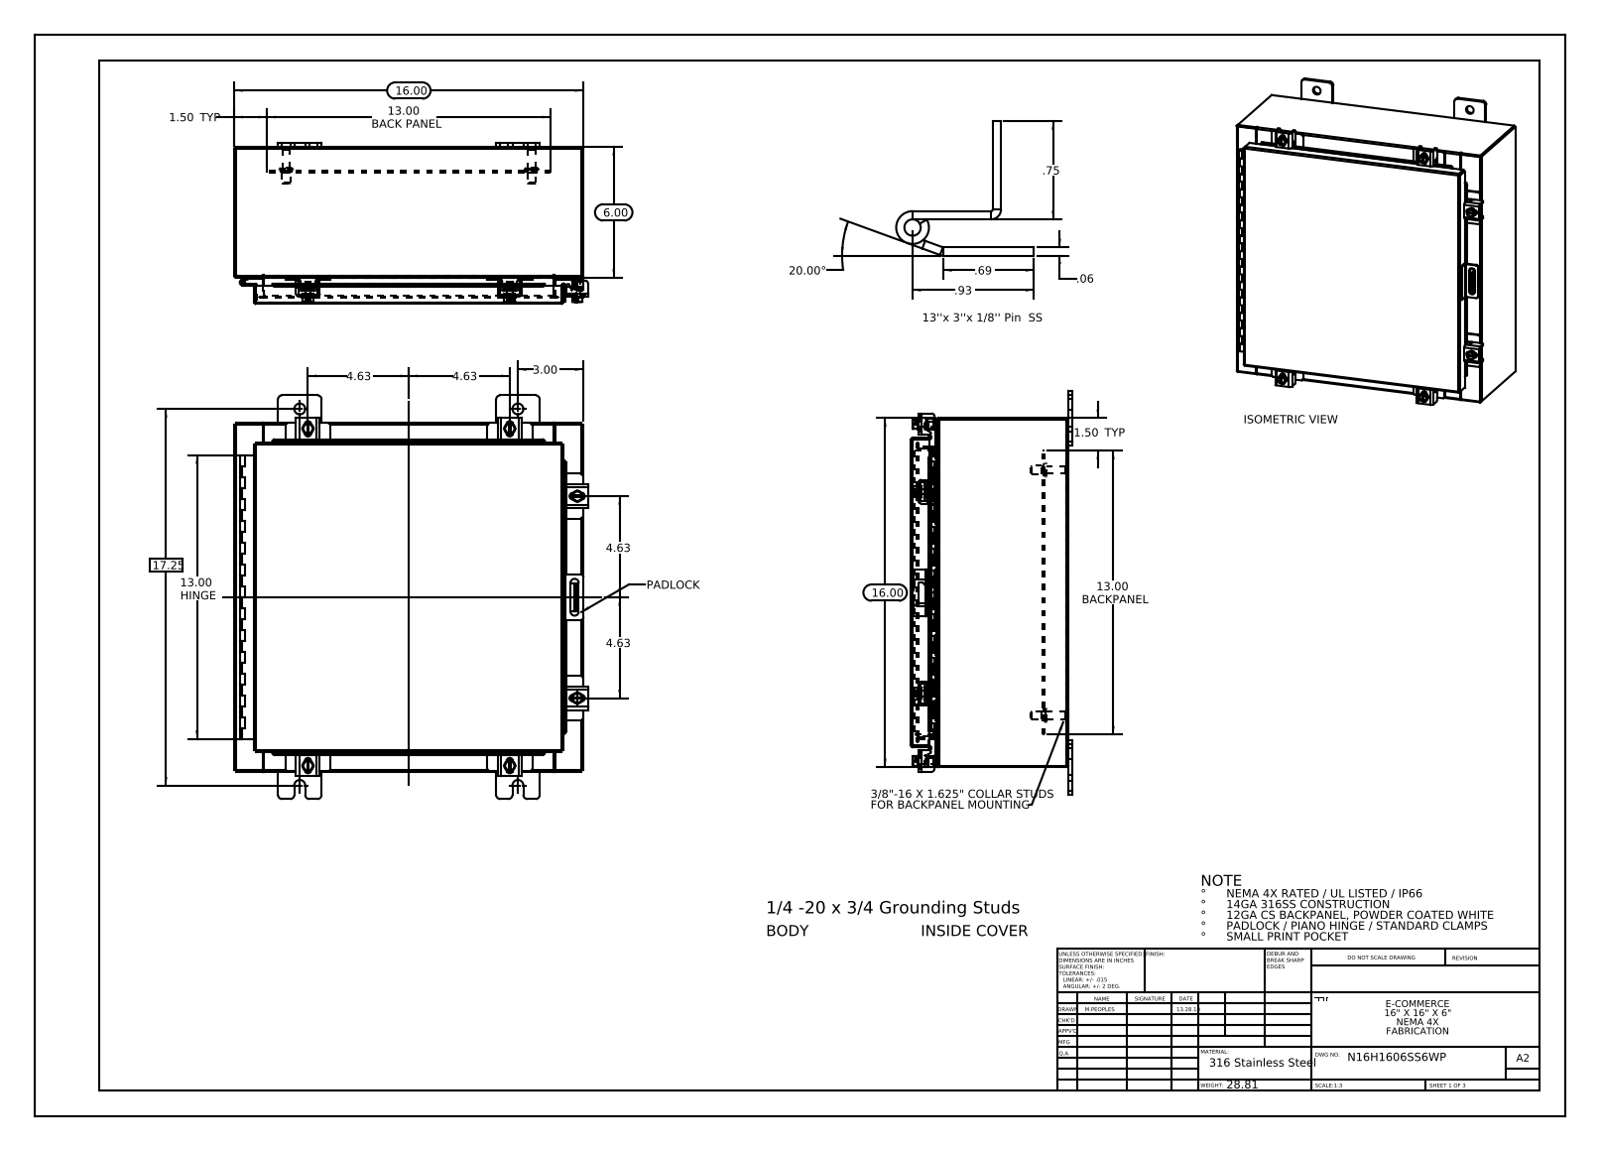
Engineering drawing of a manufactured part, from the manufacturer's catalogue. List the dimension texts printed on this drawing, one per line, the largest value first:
20.00°
17.25
16.00
16.00
13.00 HINGE
13.00 BACK PANEL
13.00 BACKPANEL
6.00
4.63
4.63
4.63
4.63
3.00
1.50 TYP
1.50 TYP
.93
.75
.69
.06
